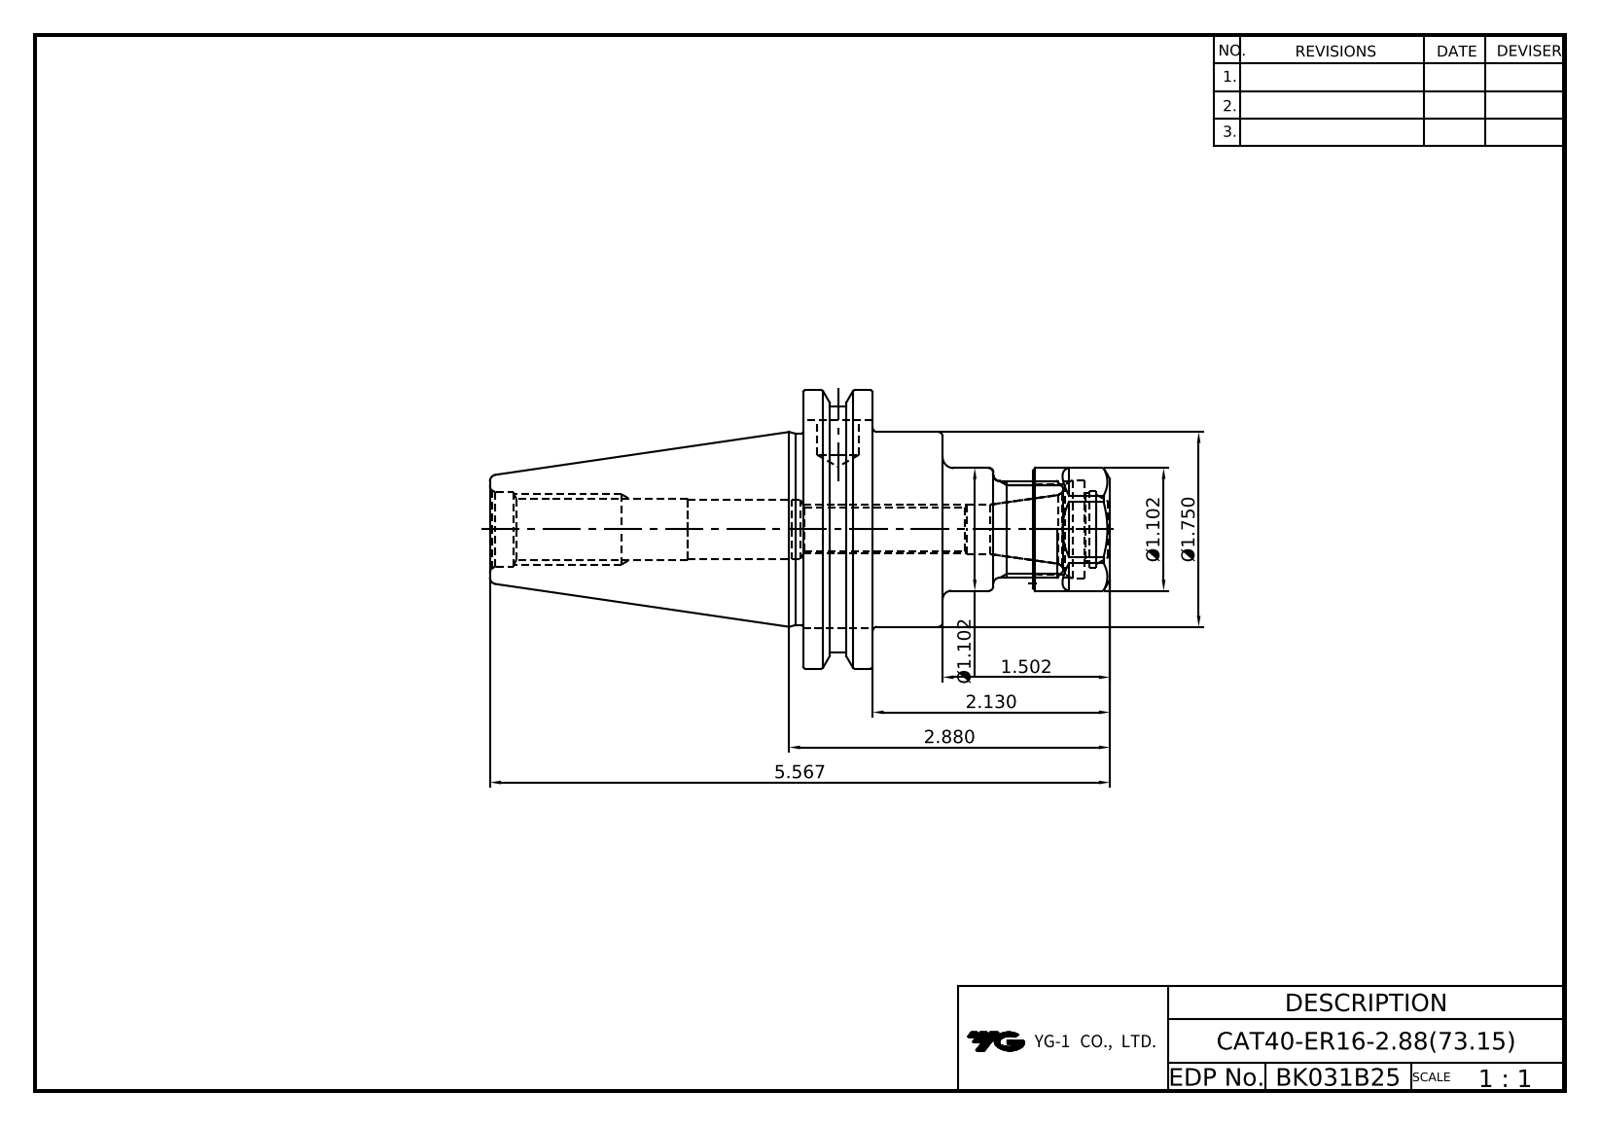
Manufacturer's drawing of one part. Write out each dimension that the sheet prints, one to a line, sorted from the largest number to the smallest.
5.567
2.880
2.130
Ø1.750
1.502
Ø1.102
Ø1.102
